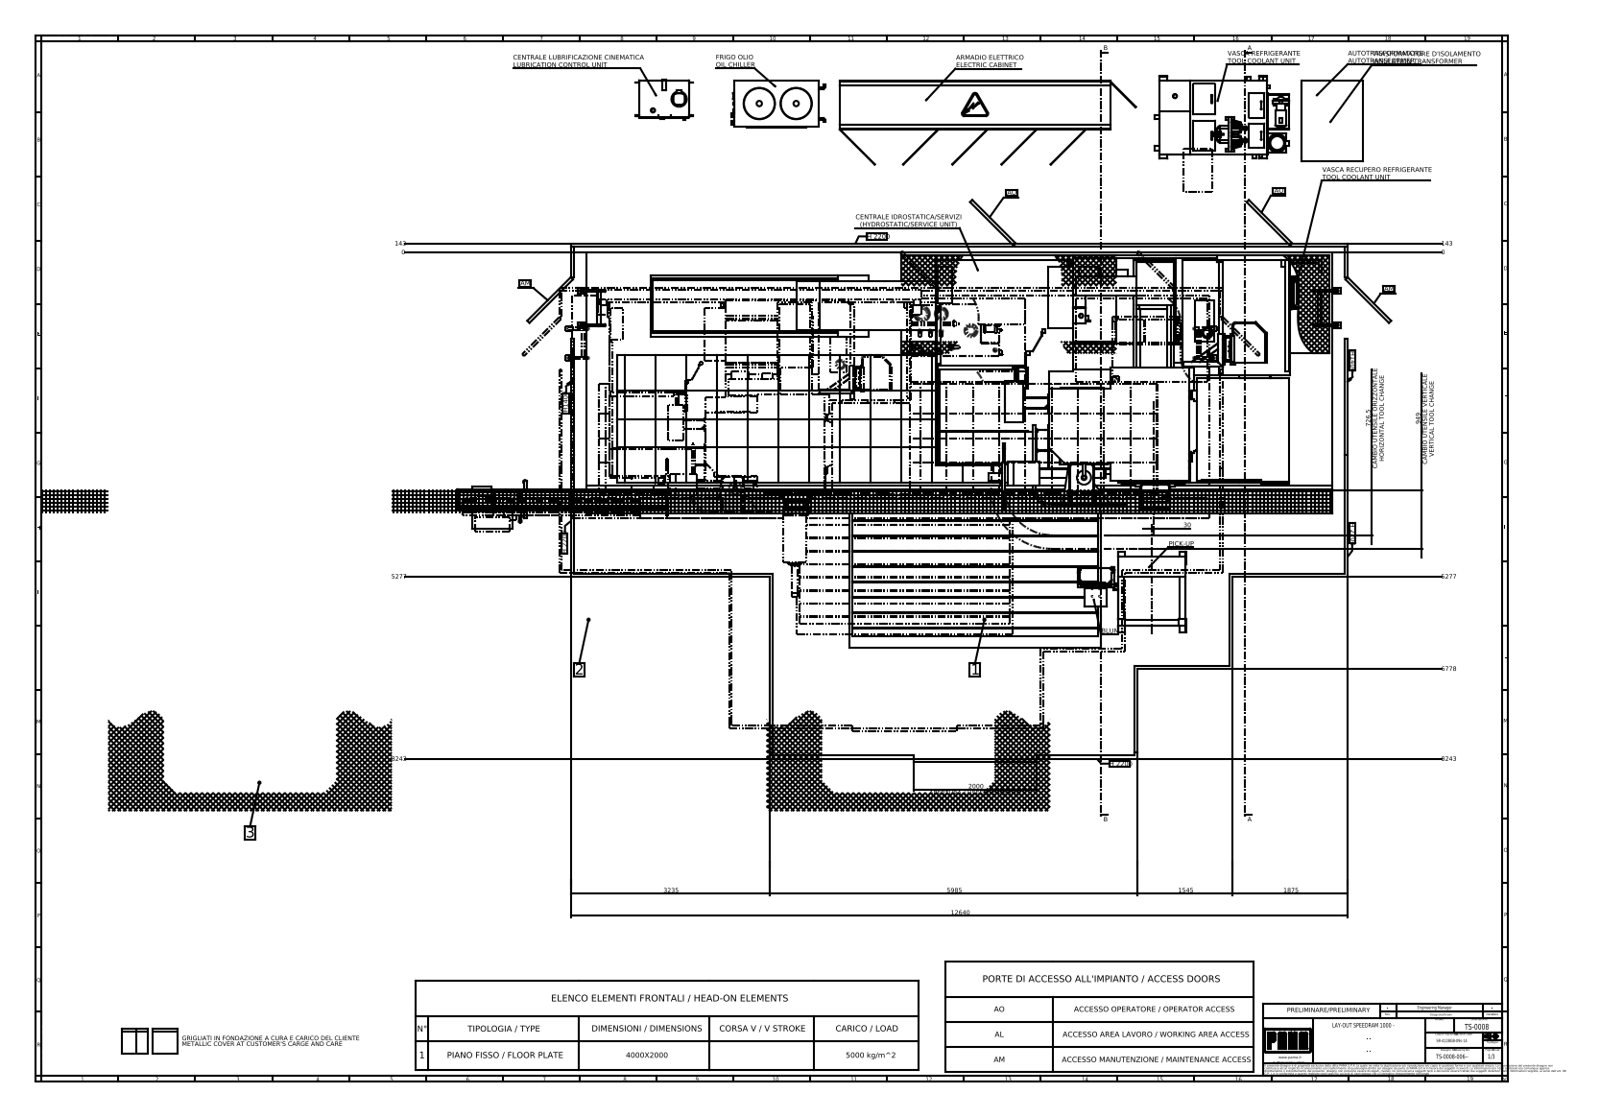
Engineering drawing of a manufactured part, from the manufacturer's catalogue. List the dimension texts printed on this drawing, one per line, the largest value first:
12640
8243
8243
6778
5985
5277
5277
3235
2000 APERTURA / USEFUL OPENING
1875
1545
949 CAMBIO UTENSILE VERTICALE VERTICAL TOOL CHANGE
726,5 CAMBIO UTENSILE ORIZZONTALE HORIZONTAL TOOL CHANGE
143
143
30
0
0
